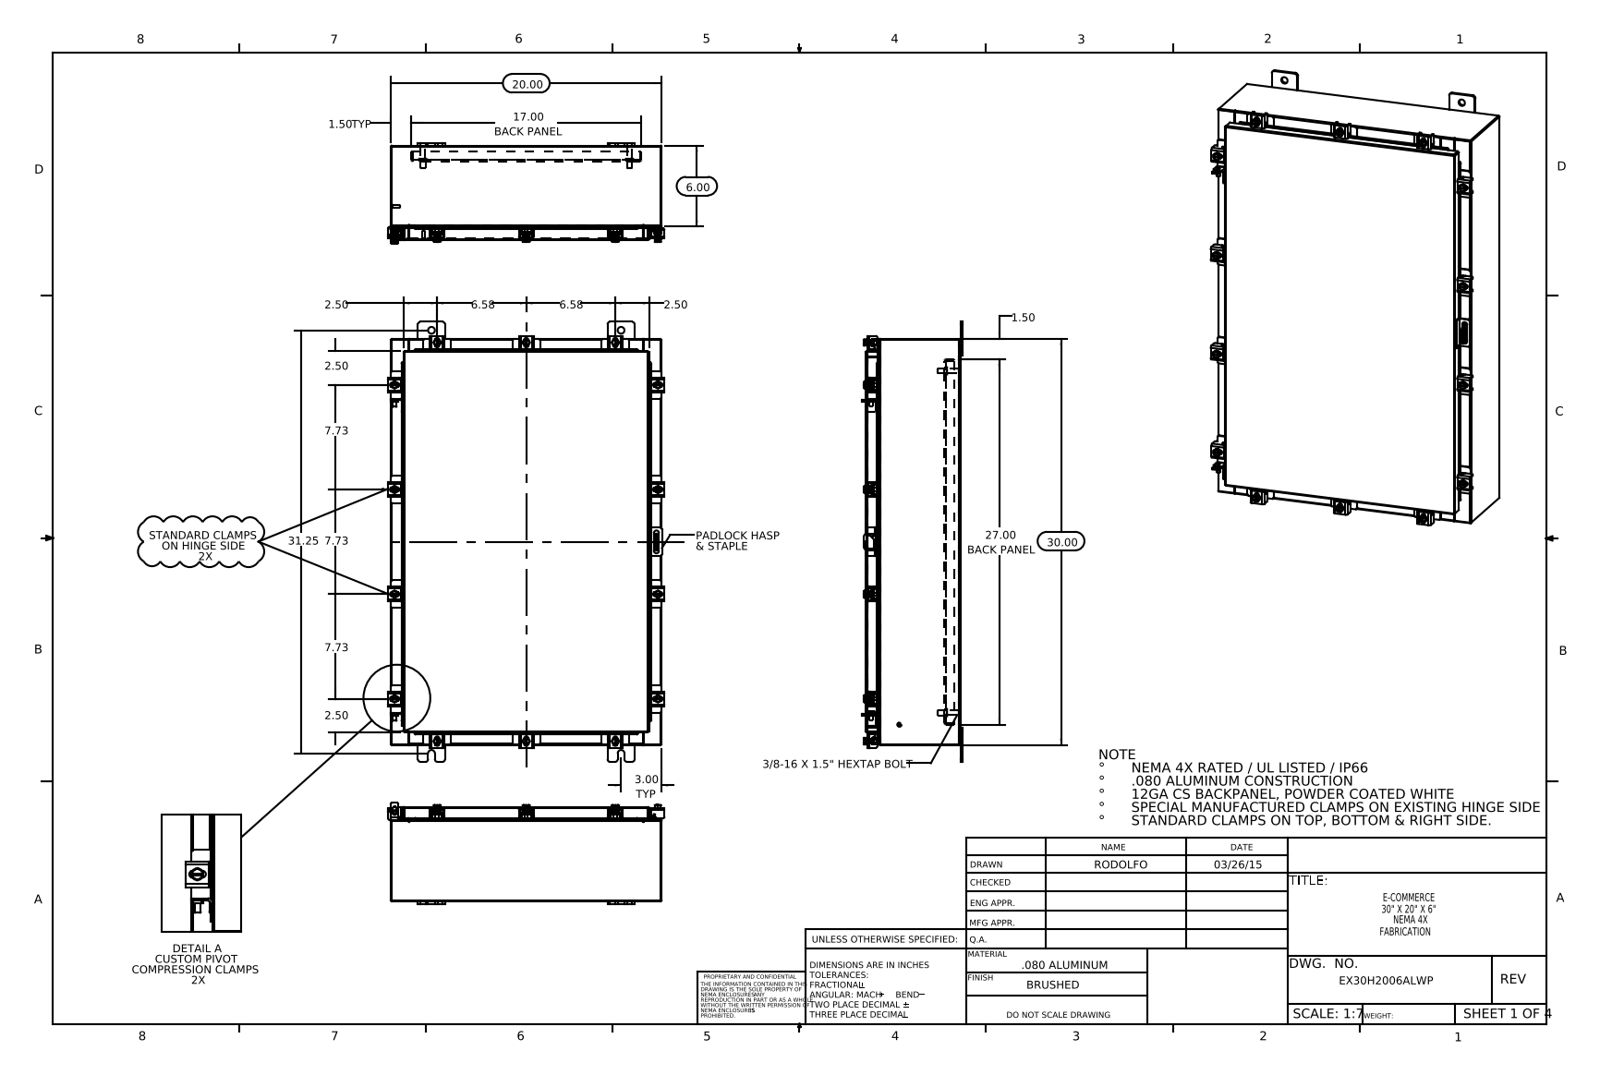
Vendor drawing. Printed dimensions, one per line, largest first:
31.25
30.00
27.00 BACK PANEL
20.00
17.00 BACK PANEL
7.73
7.73
7.73
6.58
6.58
6.00
3.00 TYP
2.50
2.50
2.50
2.50
1.50 TYP
1.50
